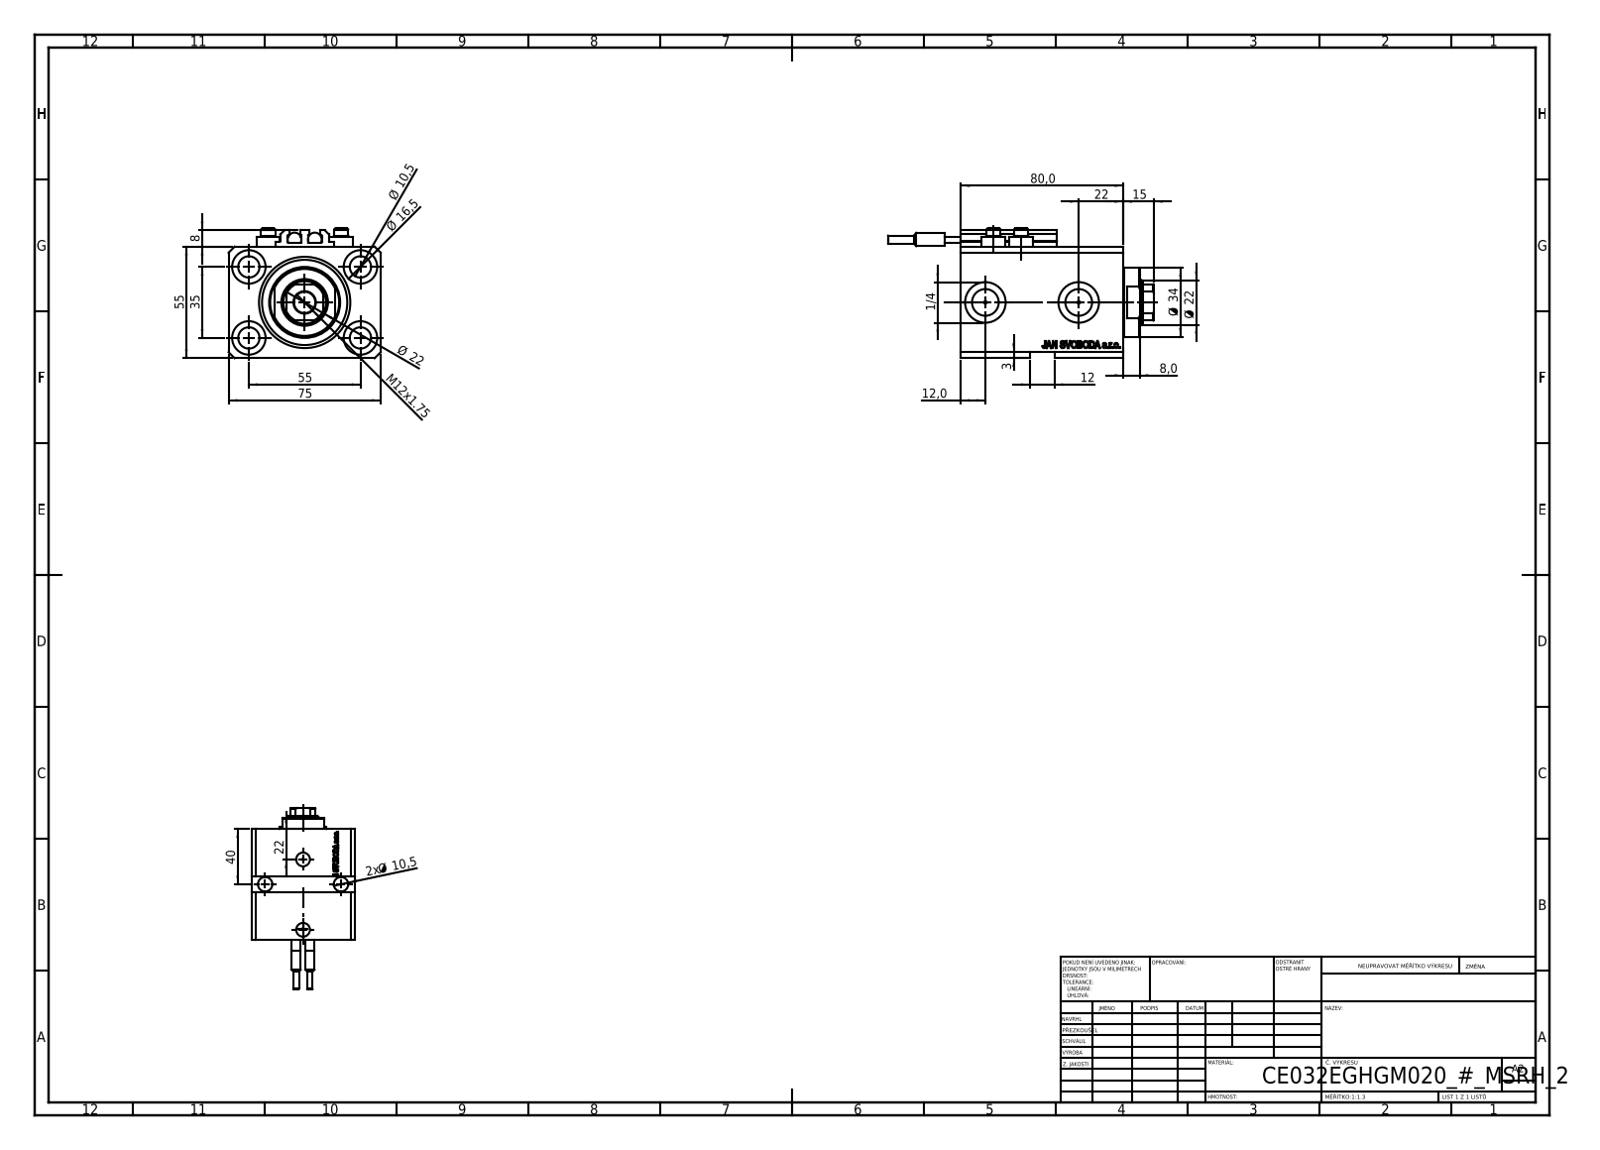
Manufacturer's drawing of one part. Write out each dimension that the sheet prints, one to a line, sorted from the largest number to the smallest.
80,0
75
55
55
40
35
Ø 34
Ø 22
22
Ø 22
22
Ø 16,5
15
M12x1.75
12,0
12
Ø 10,5
2x Ø 10,5
8
8,0
3
1/4
